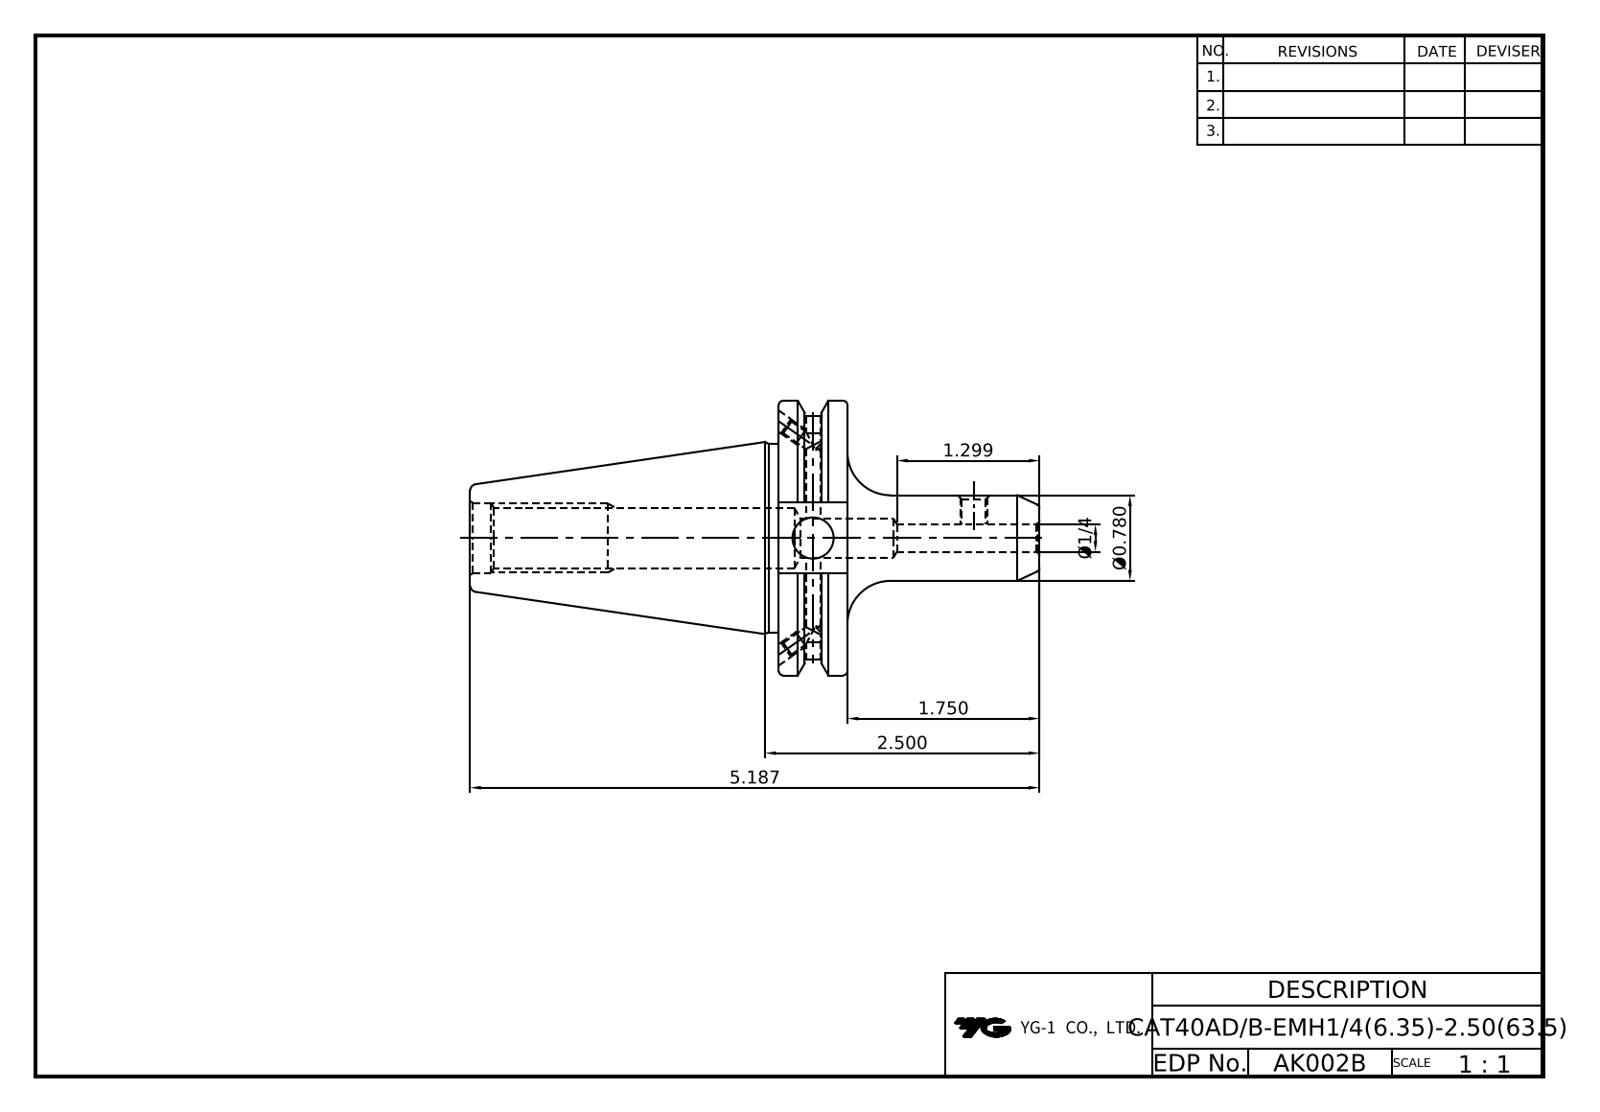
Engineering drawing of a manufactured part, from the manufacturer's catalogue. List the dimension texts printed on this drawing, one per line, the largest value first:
5.187
2.500
1.750
1.299
Ø0.780
Ø1/4
